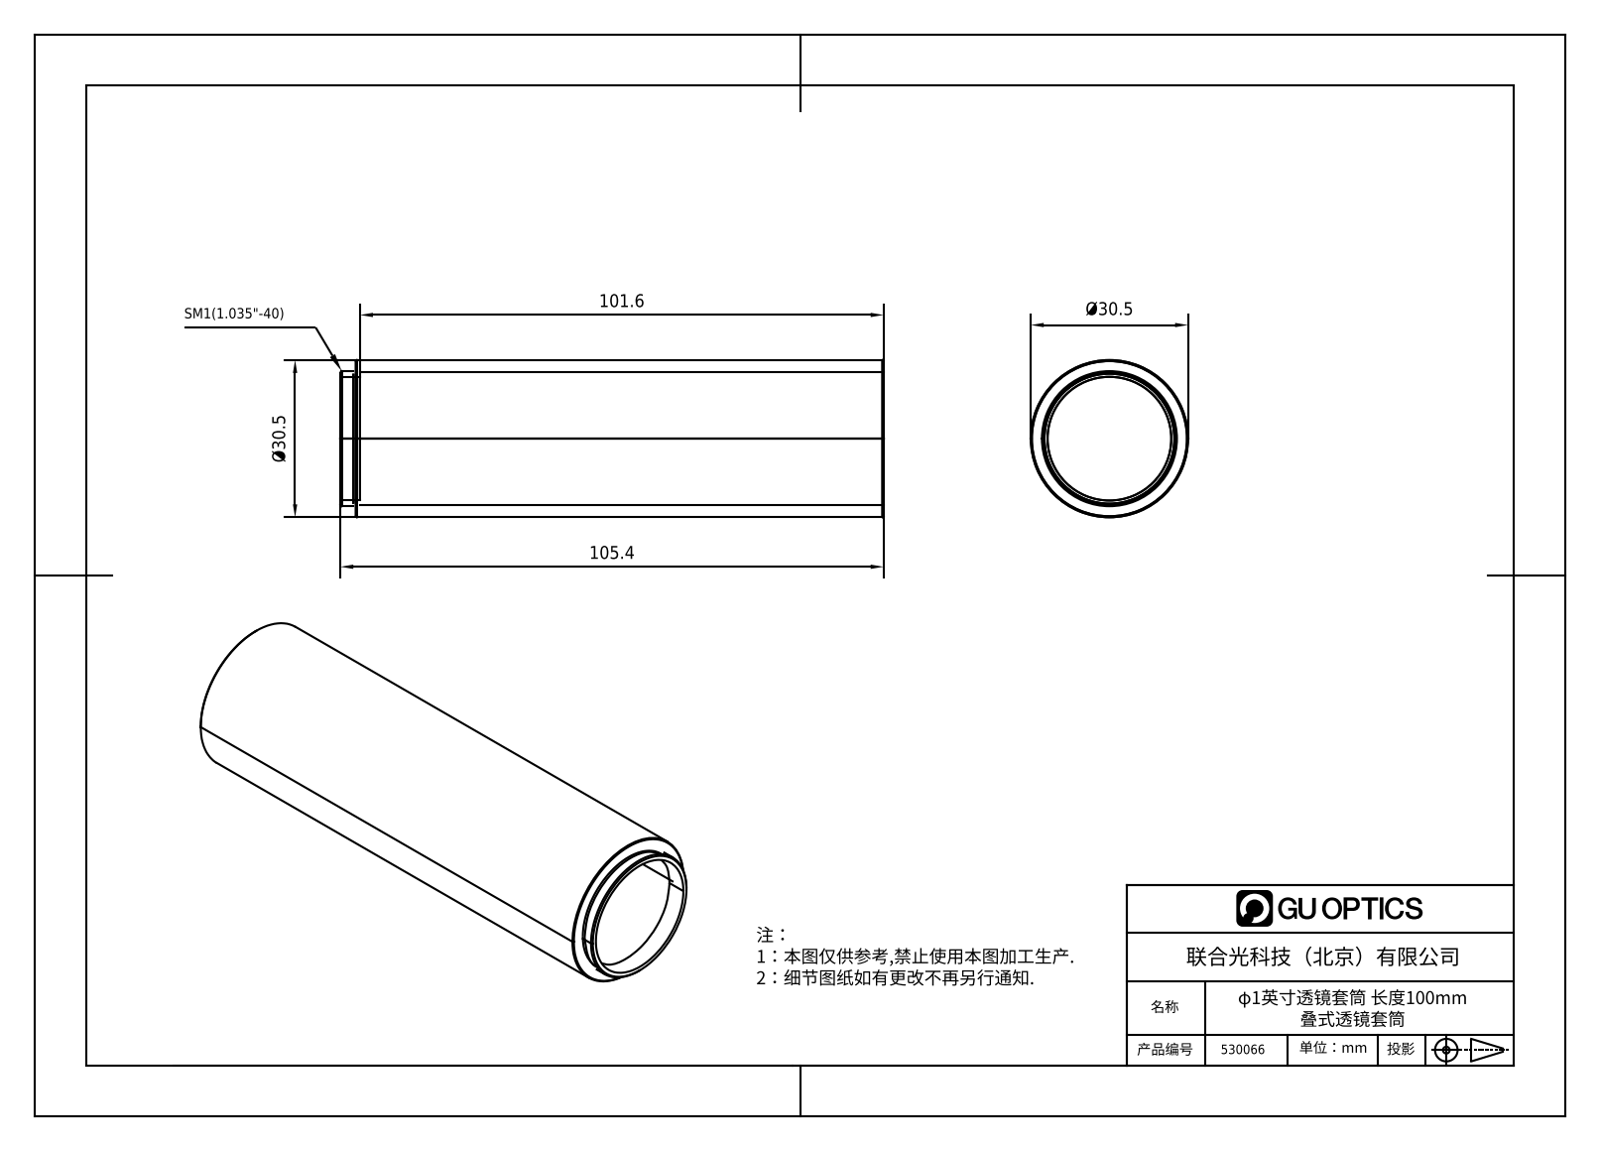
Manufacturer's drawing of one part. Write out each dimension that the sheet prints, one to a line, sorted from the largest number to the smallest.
105.4
101.6
Ø30.5
Ø30.5
